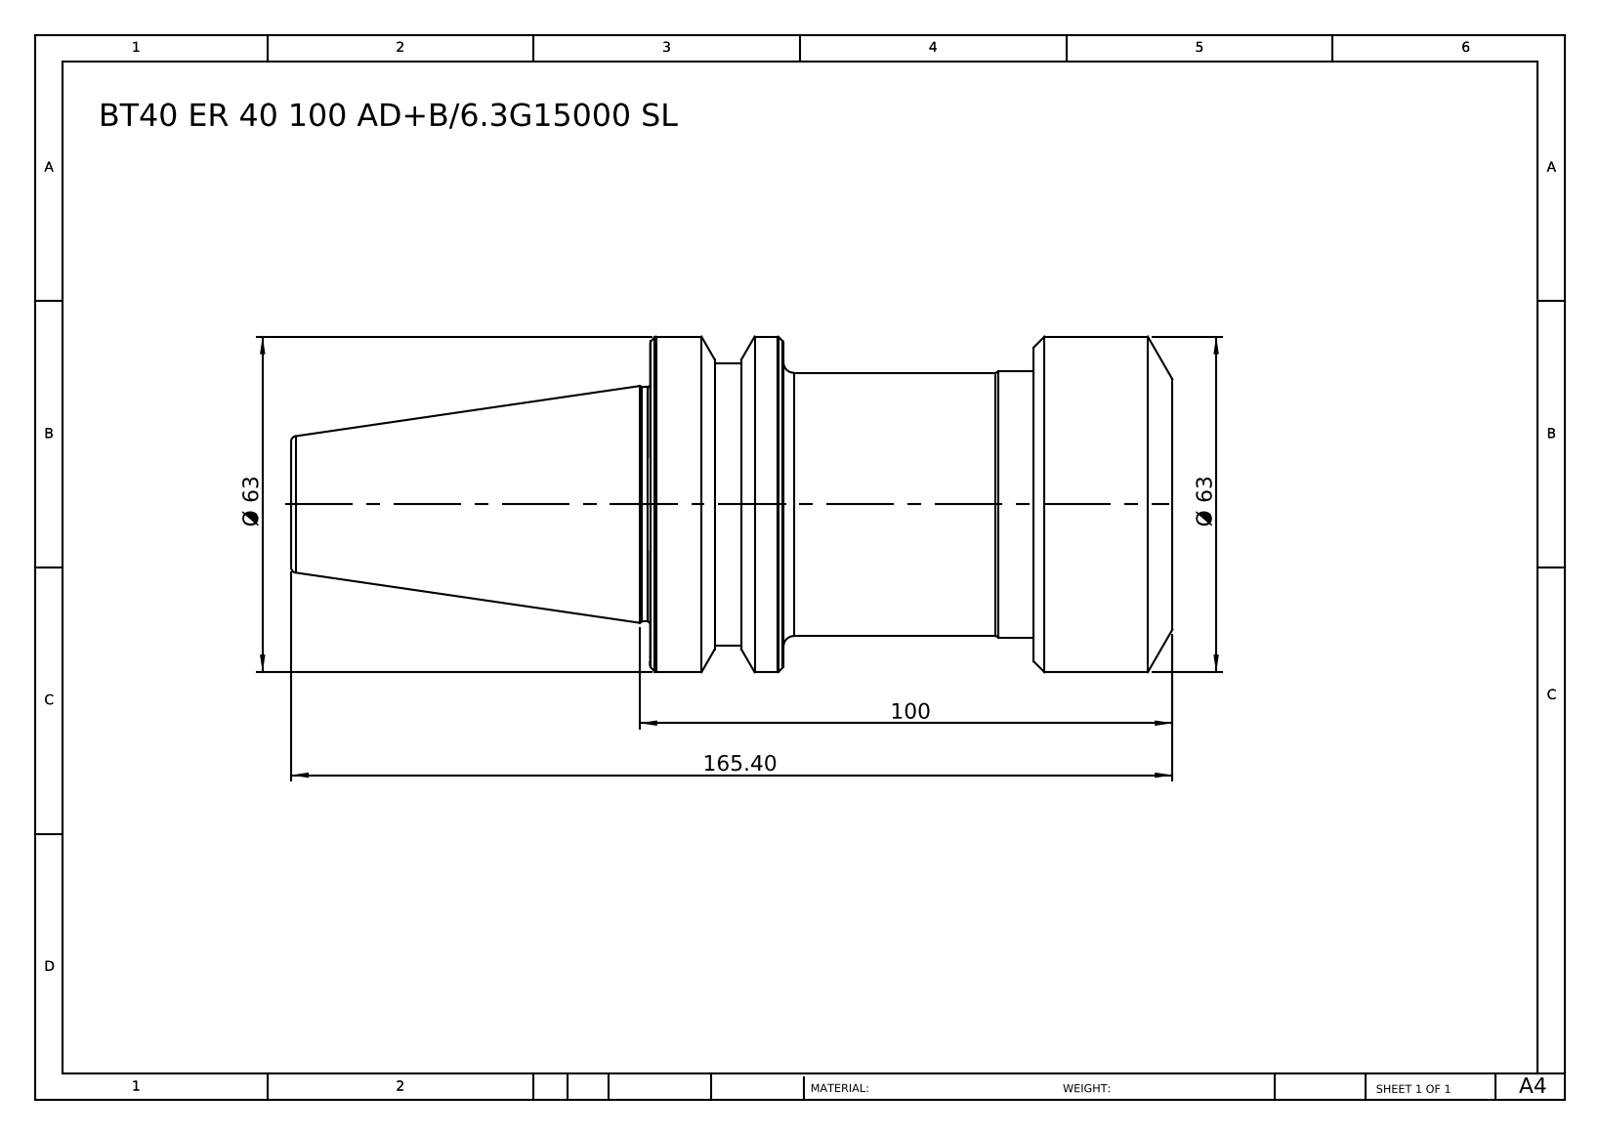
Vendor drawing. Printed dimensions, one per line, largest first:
165.40
100
Ø 63
Ø 63
